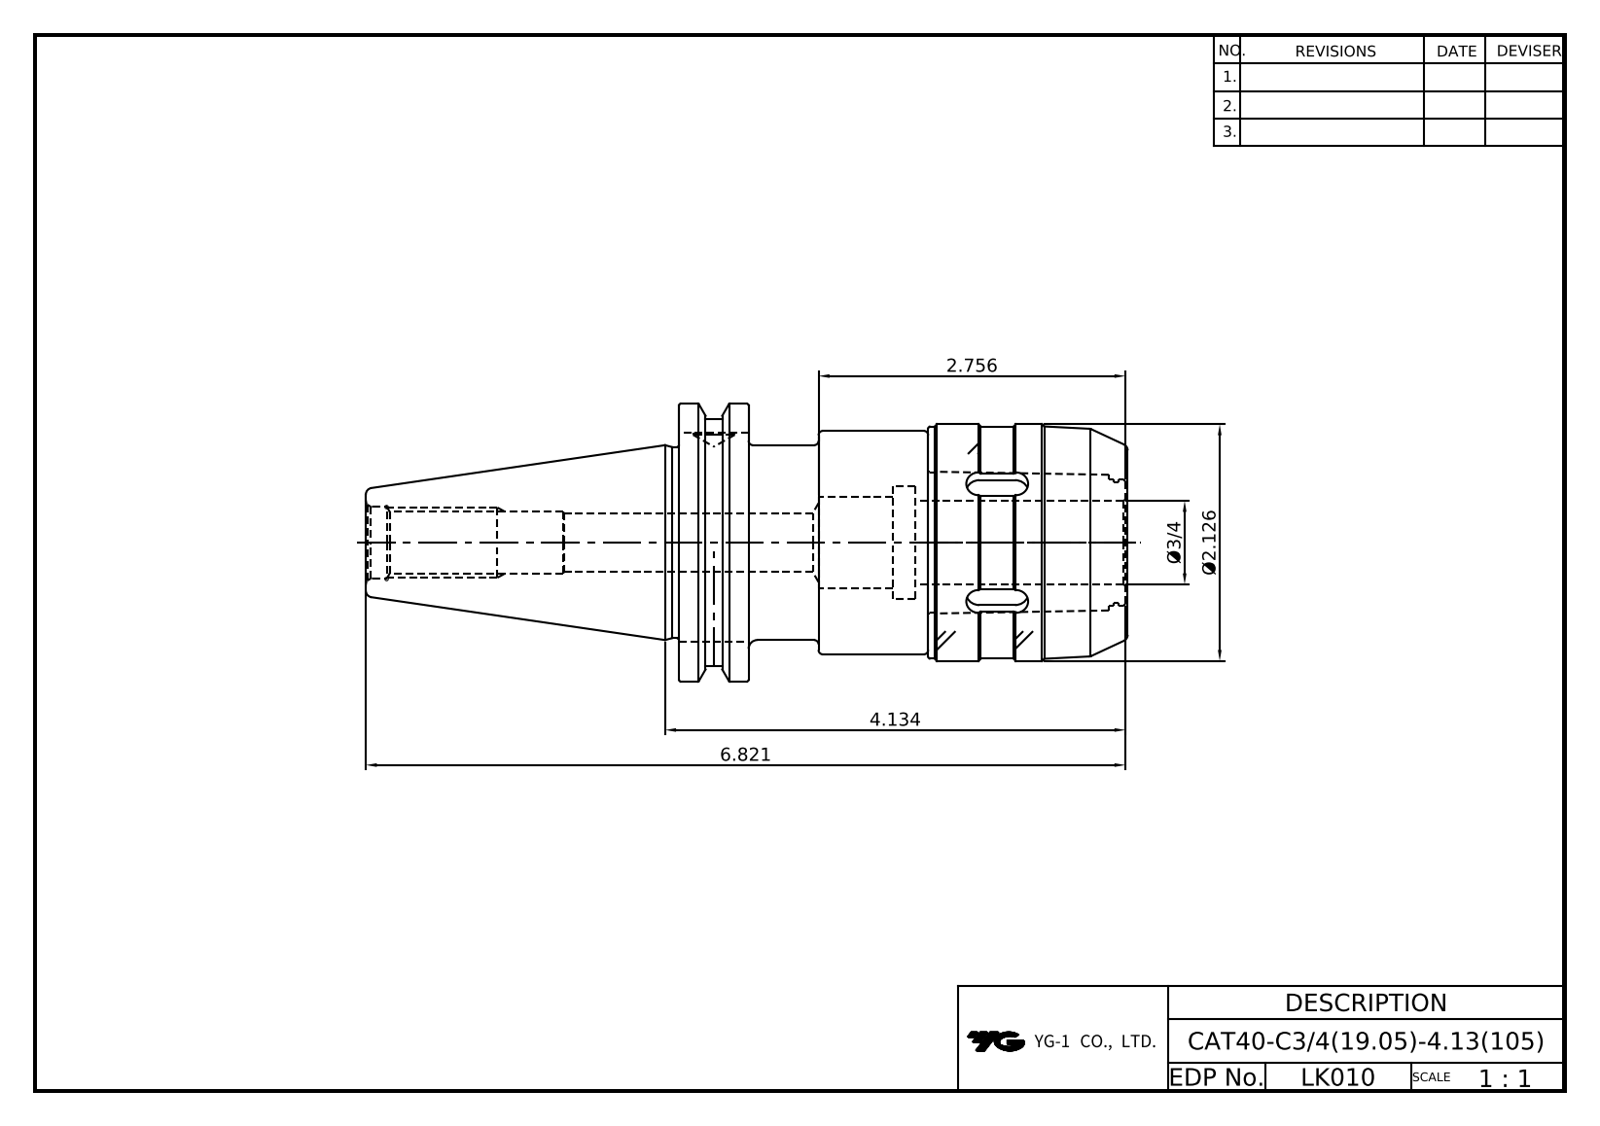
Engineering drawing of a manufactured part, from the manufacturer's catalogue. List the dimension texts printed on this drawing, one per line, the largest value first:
6.821
4.134
2.756
Ø2.126
Ø3/4
